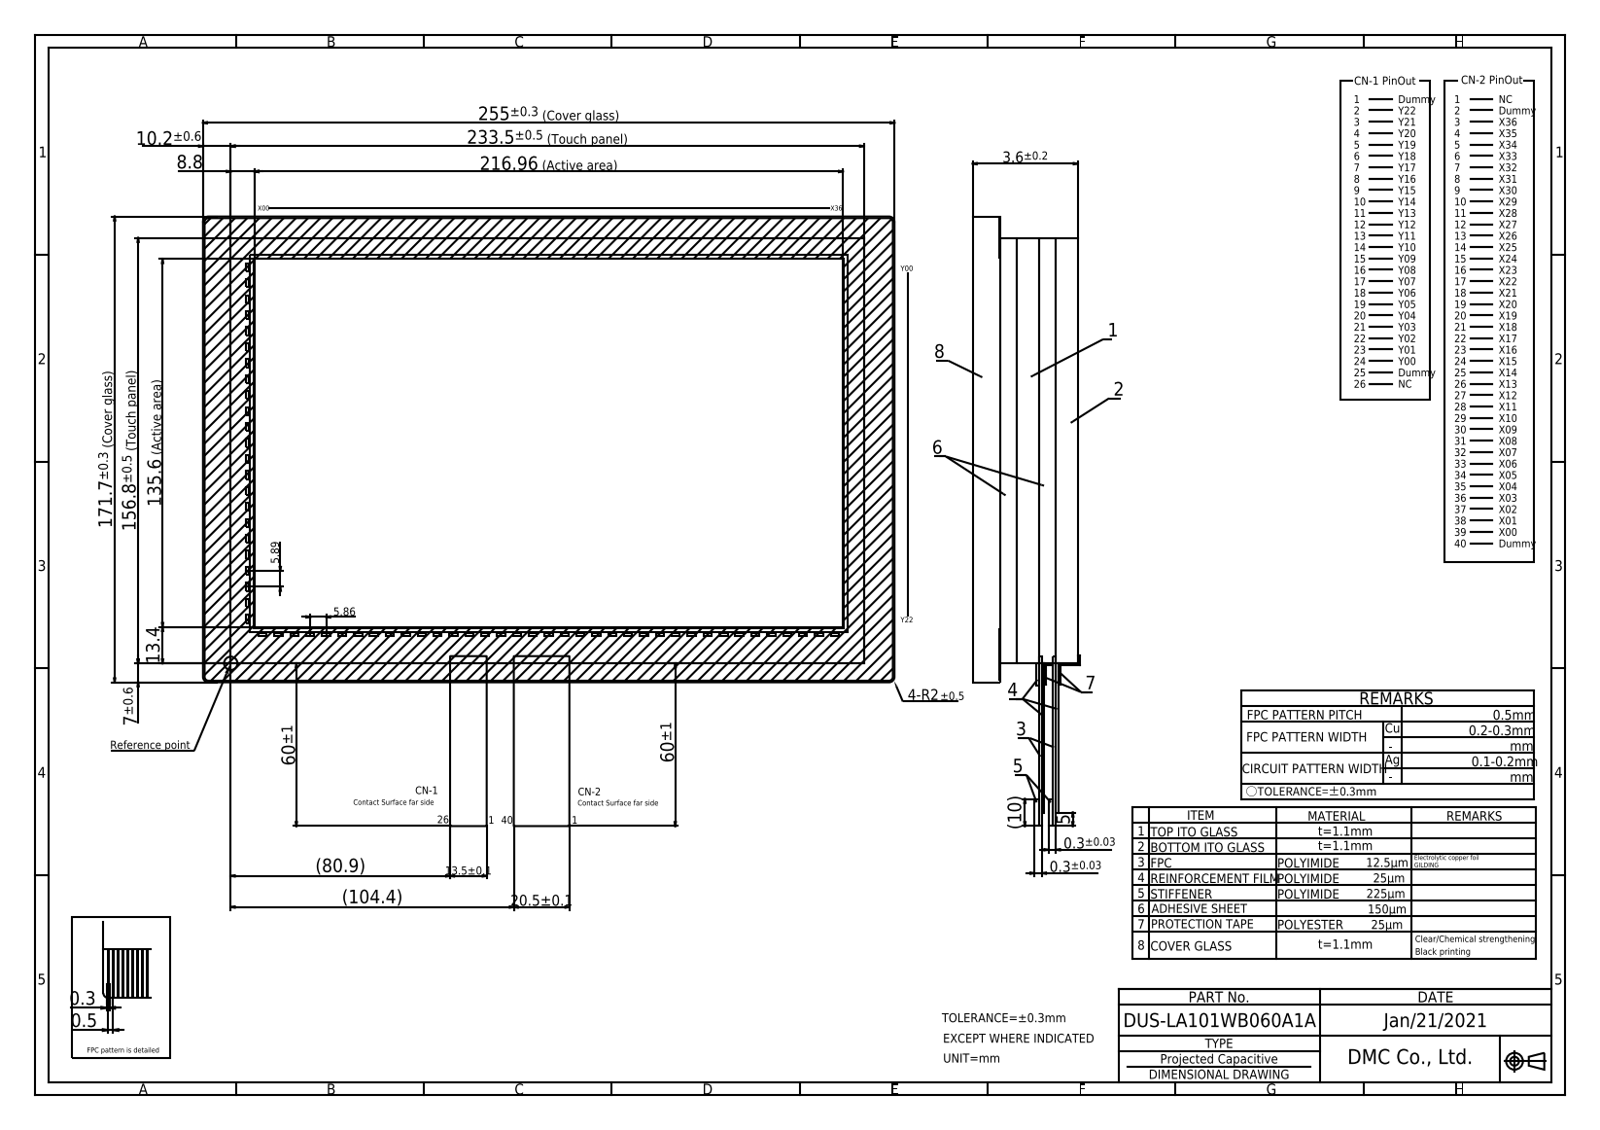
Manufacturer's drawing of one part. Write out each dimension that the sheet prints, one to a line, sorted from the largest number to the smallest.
255±0.3 (Cover glass)
233.5±0.5 (Touch panel)
216.96 (Active area)
171.7±0.3 (Cover glass)
156.8±0.5 (Touch panel)
135.6 (Active area)
(104.4)
(80.9)
60±1
60±1
20.5±0.1
13.5±0.1
13.4
10.2±0.6
(10)
8.8
7±0.6
5.89
5.86
5
3.6±0.2
0.5
0.3
0.3±0.03
0.3±0.03
